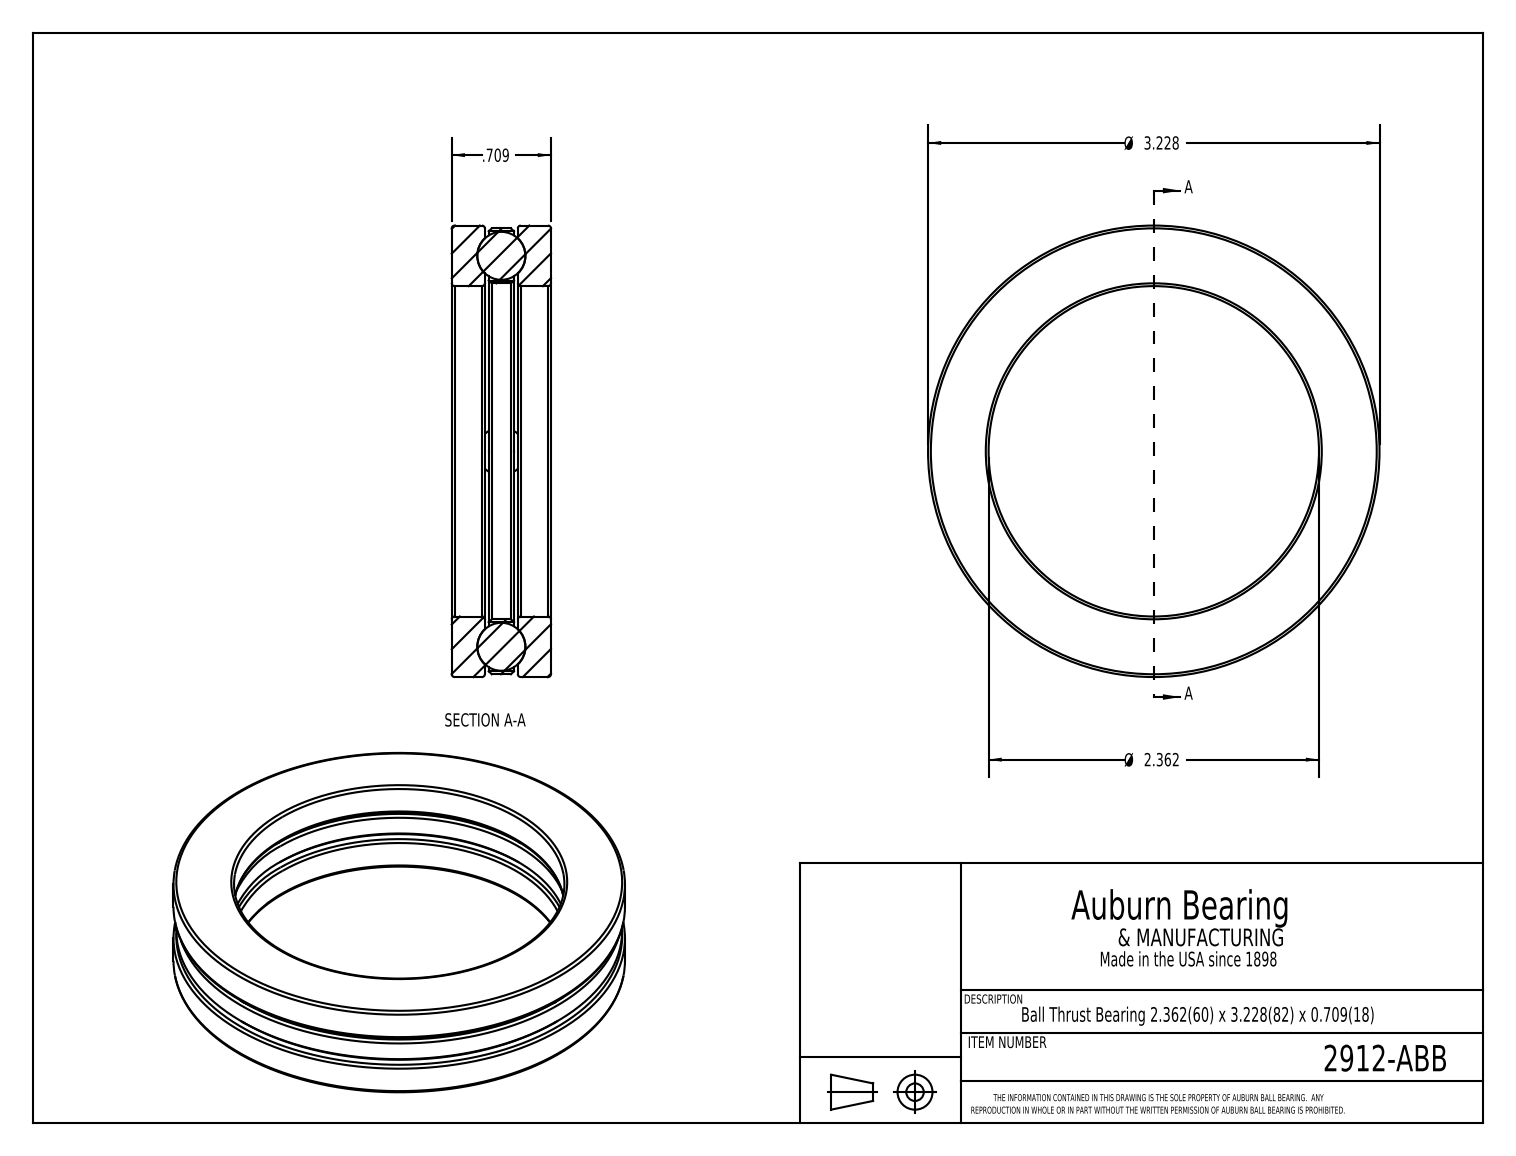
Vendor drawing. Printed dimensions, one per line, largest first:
Ø 3.228
Ø 2.362
.709
